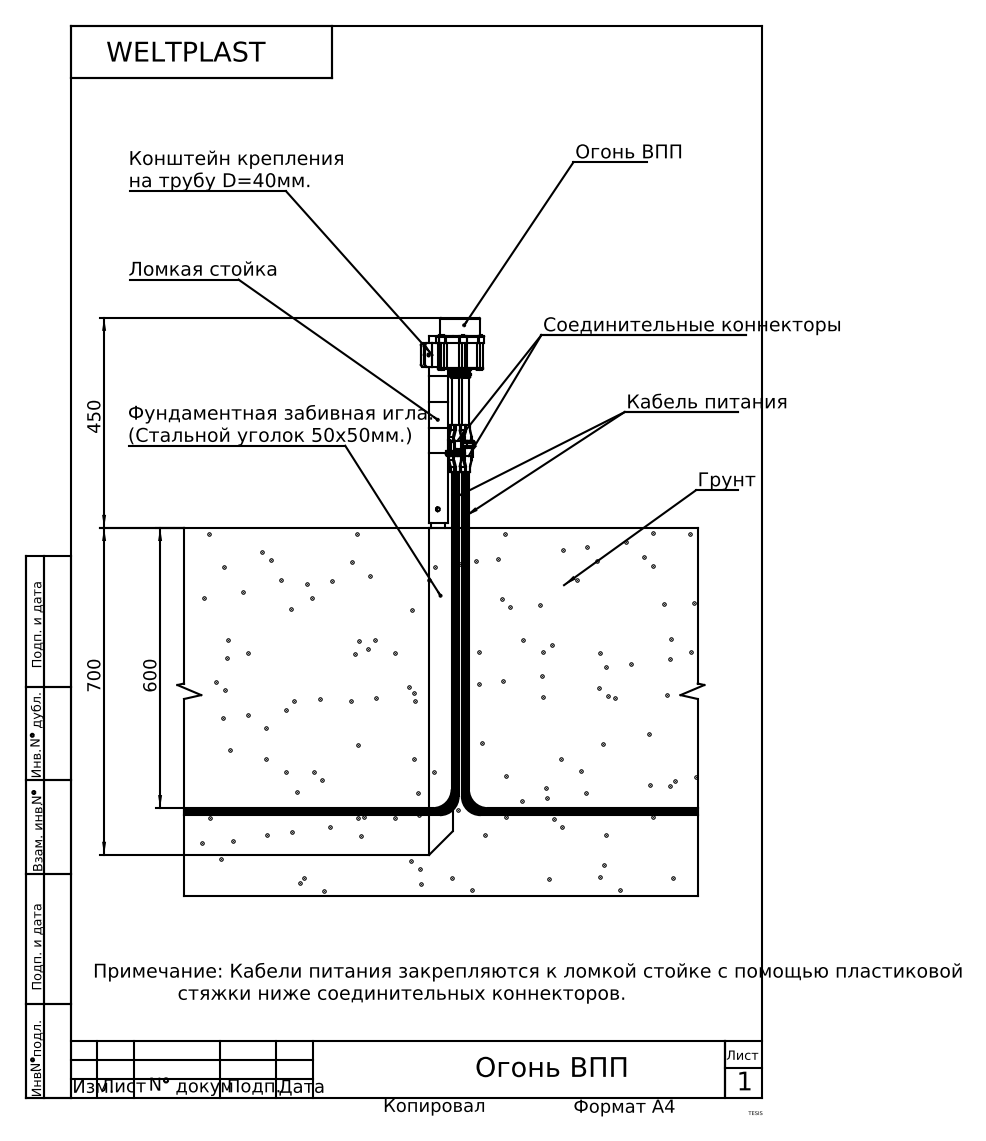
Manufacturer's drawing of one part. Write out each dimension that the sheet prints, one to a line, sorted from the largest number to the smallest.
700
600
450
